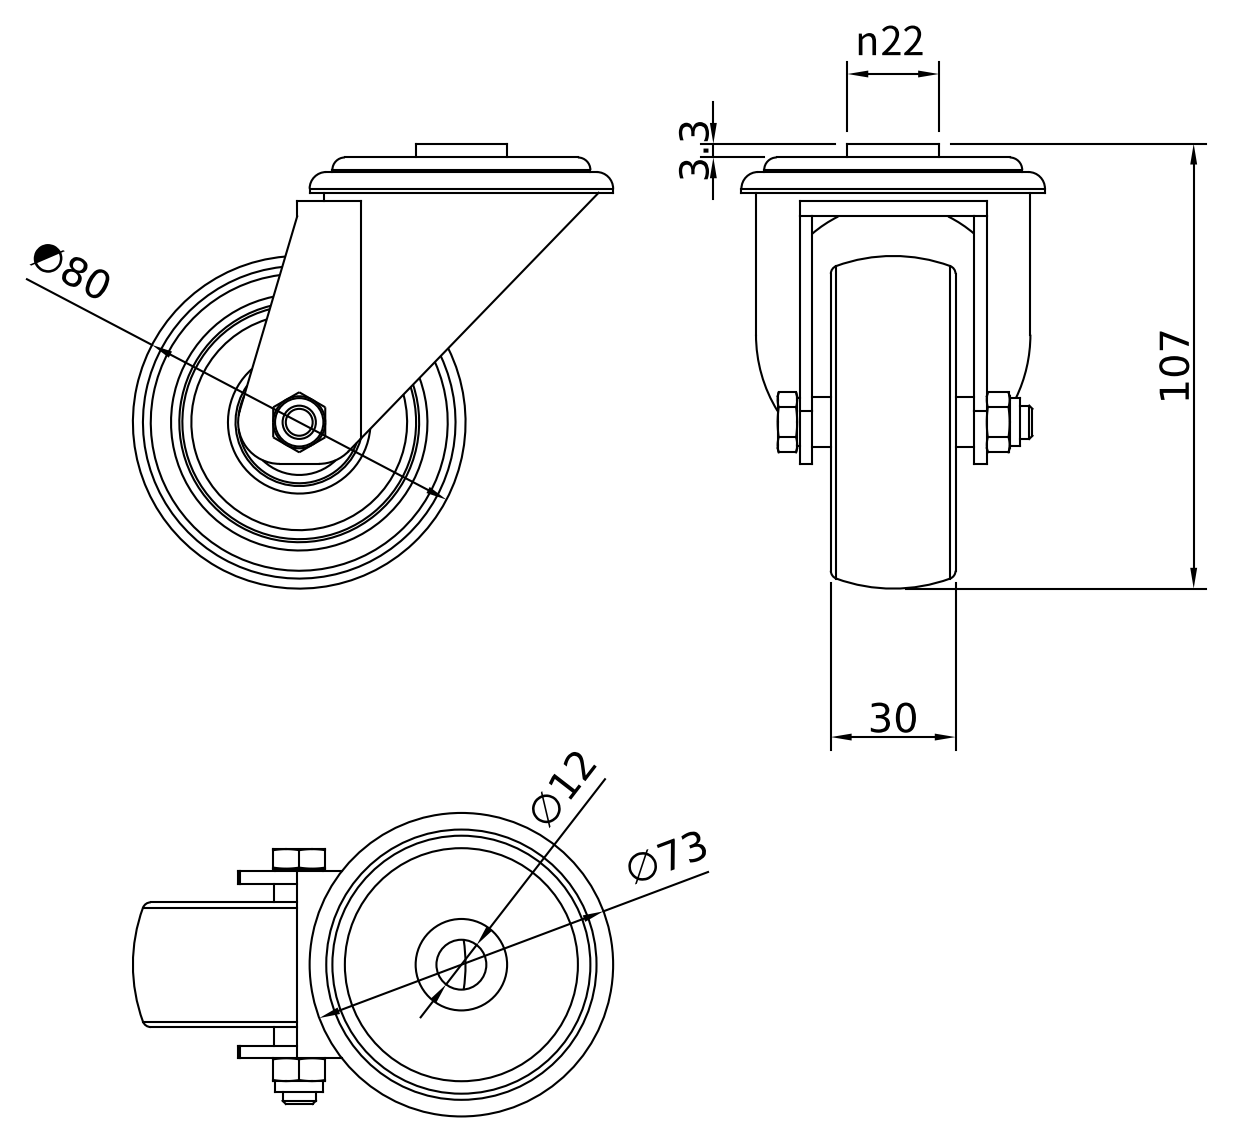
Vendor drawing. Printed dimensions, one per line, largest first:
107
∅80
∅73
30
n22
∅12
3.3
